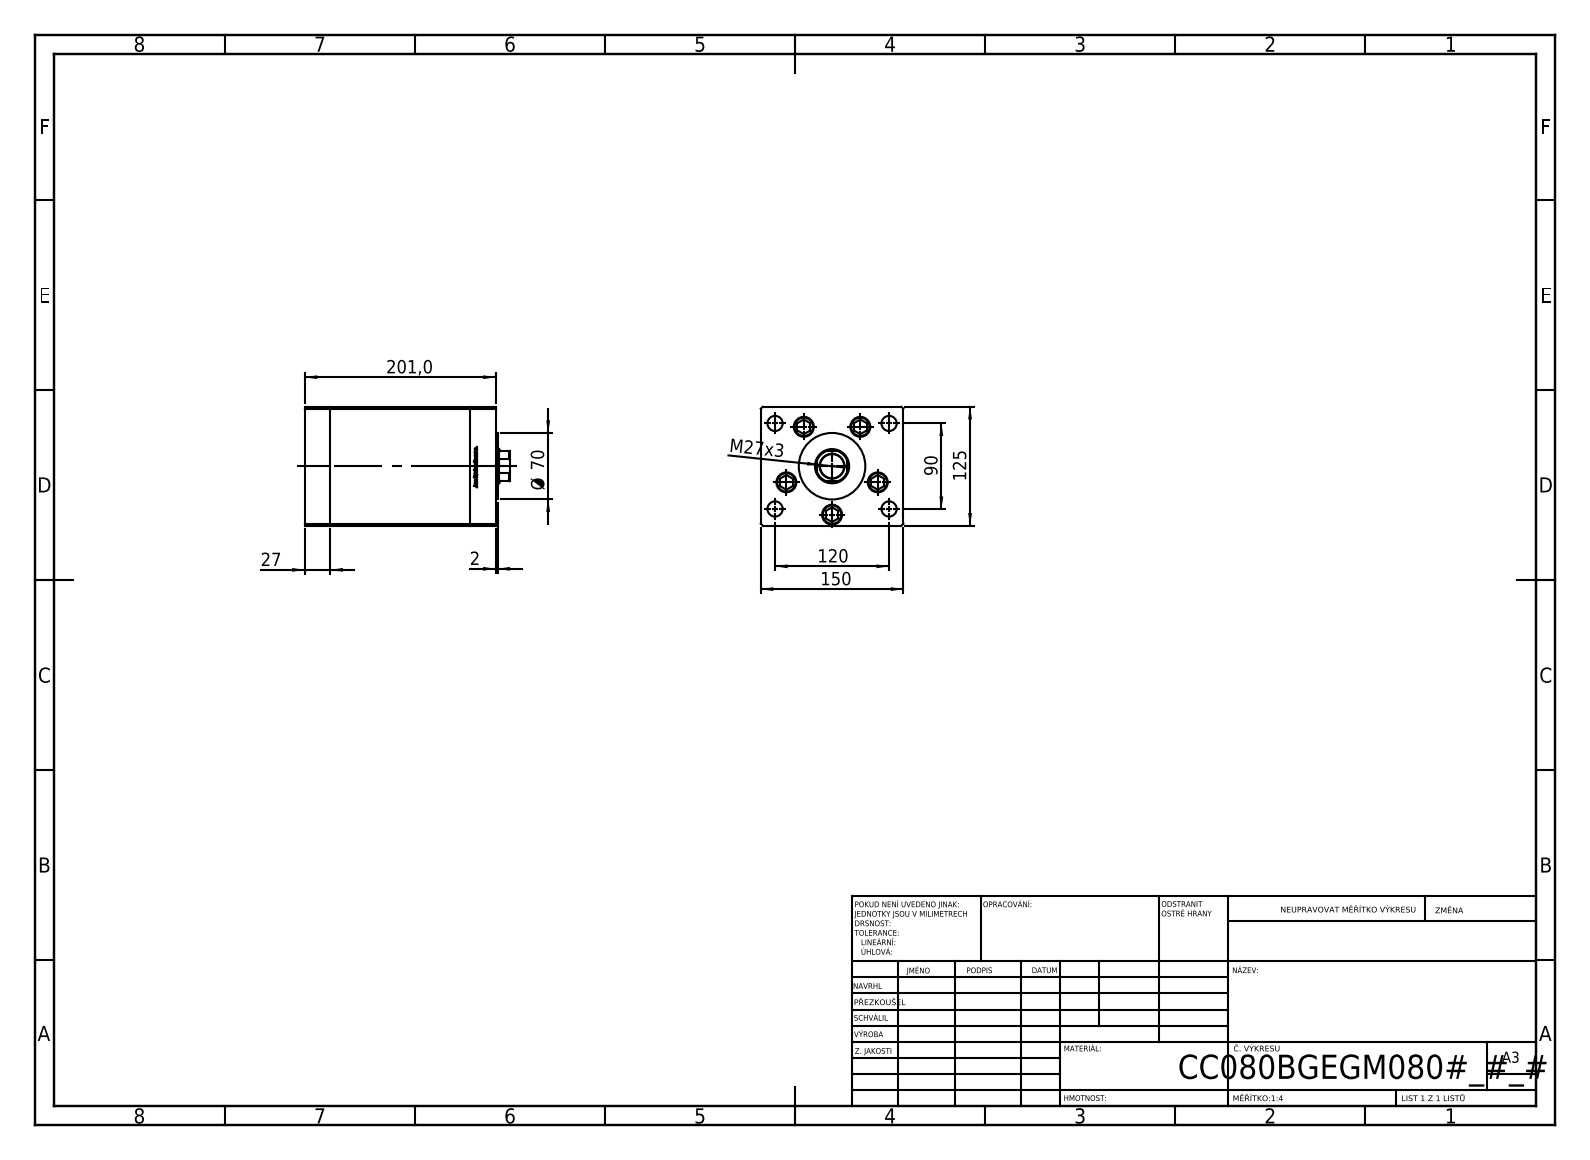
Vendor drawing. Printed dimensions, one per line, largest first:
201,0
150
125
120
90
Ø 70
27
M27x3
2
